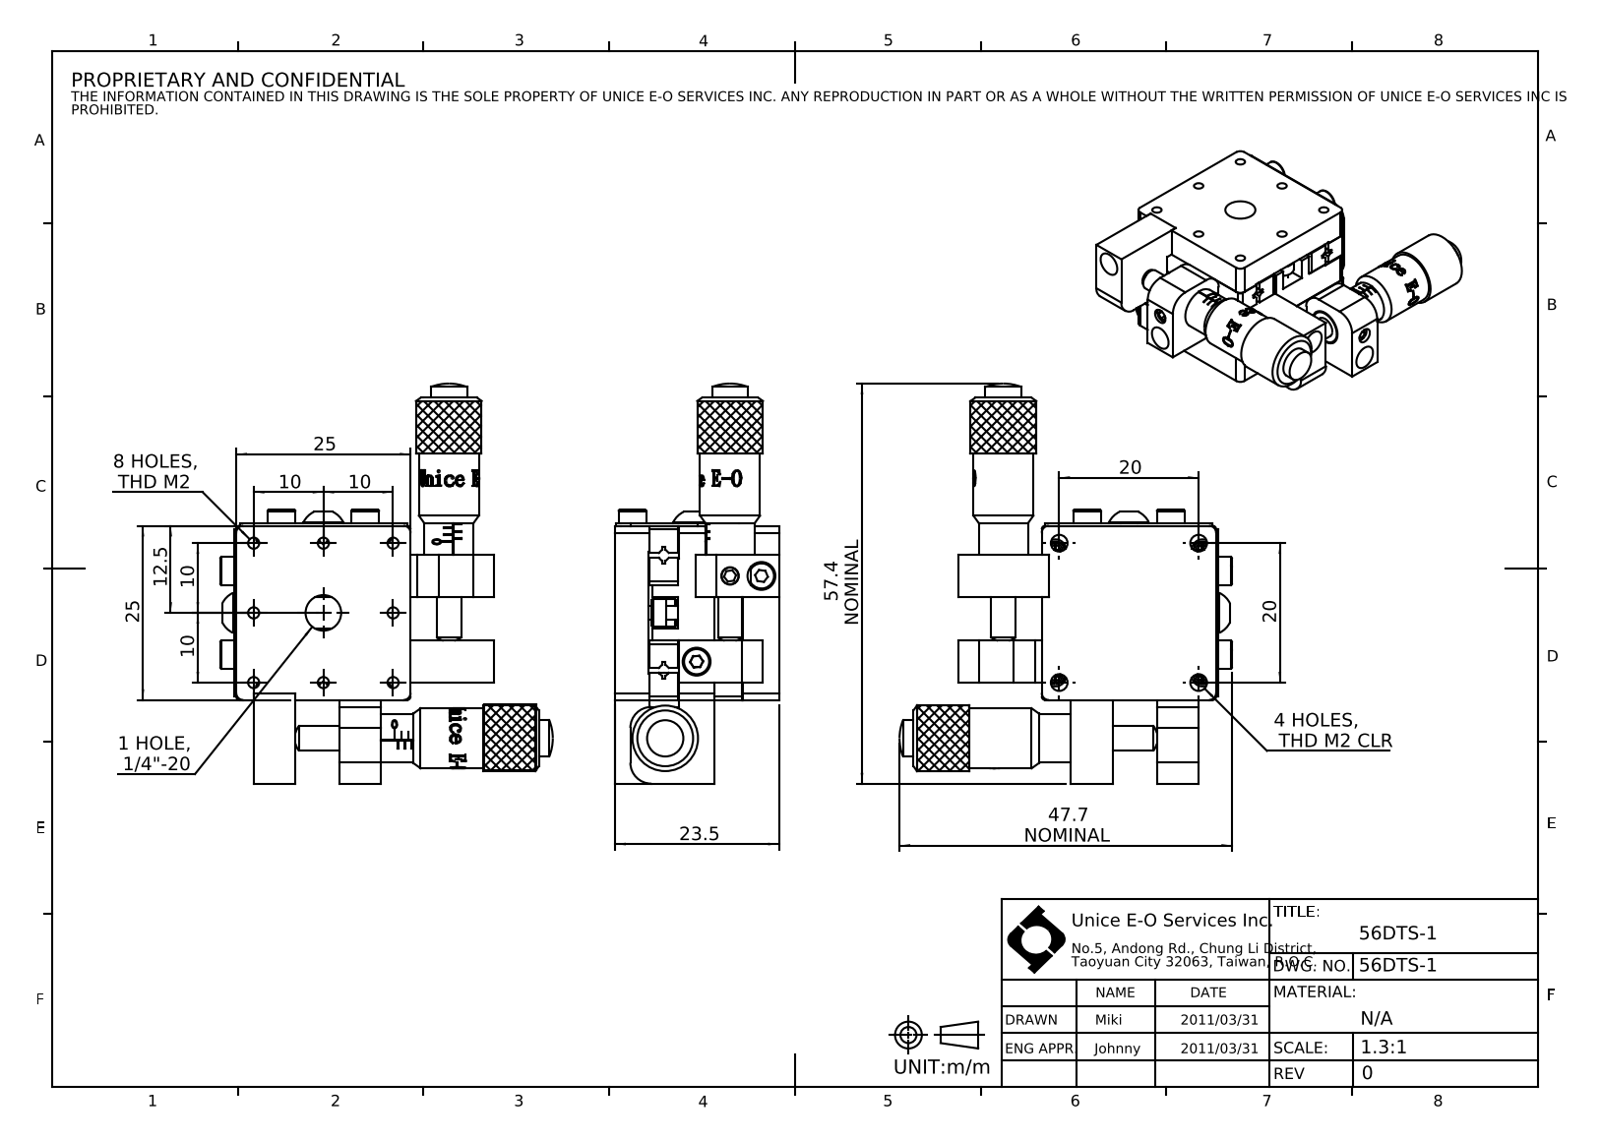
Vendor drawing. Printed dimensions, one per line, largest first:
57.4 NOMINAL
47.7 NOMINAL
25
25
23.5
20
20
12.5
10
10
10
10
8 HOLES, THD M2
4 HOLES, THD M2 CLR
1 HOLE, 1/4"-20
